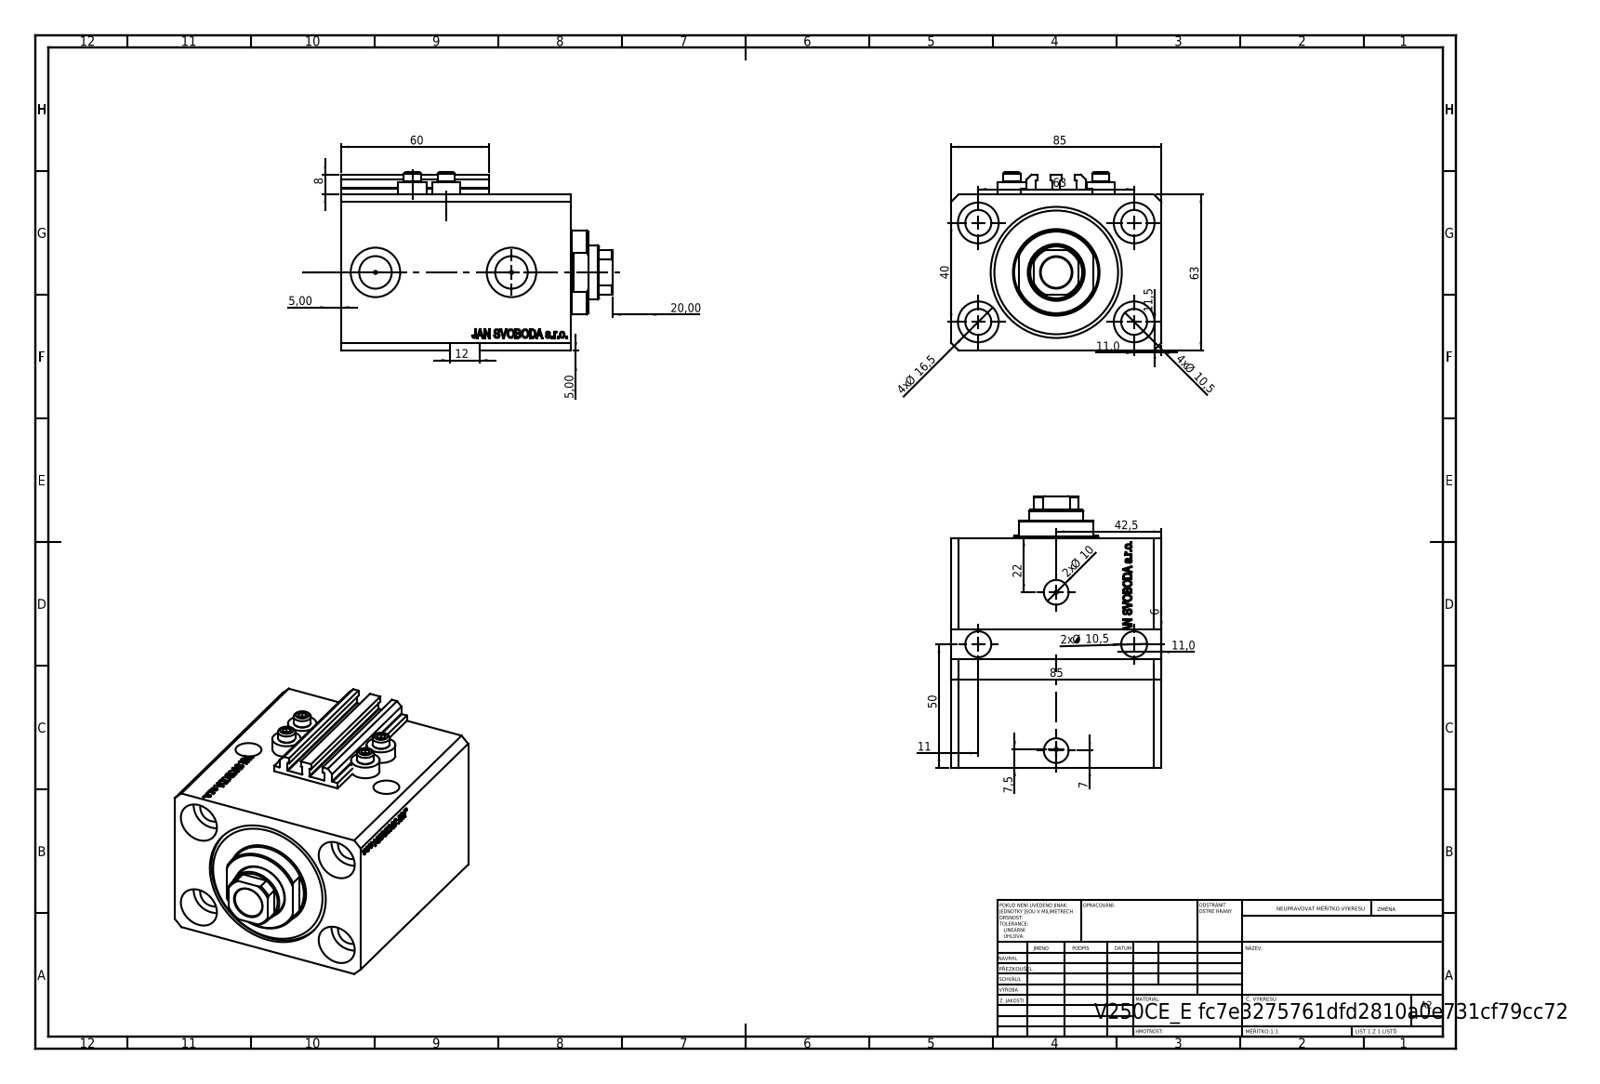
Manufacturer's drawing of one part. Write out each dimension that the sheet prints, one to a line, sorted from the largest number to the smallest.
85
85
63
63
60
50
42,5
40
22
20,00
4x Ø 16,5
12
11,5
11,0
11,0
11
4x Ø 10,5
2x Ø 10,5
2x Ø 10
8
7,5
7
6
5,00
5,00
